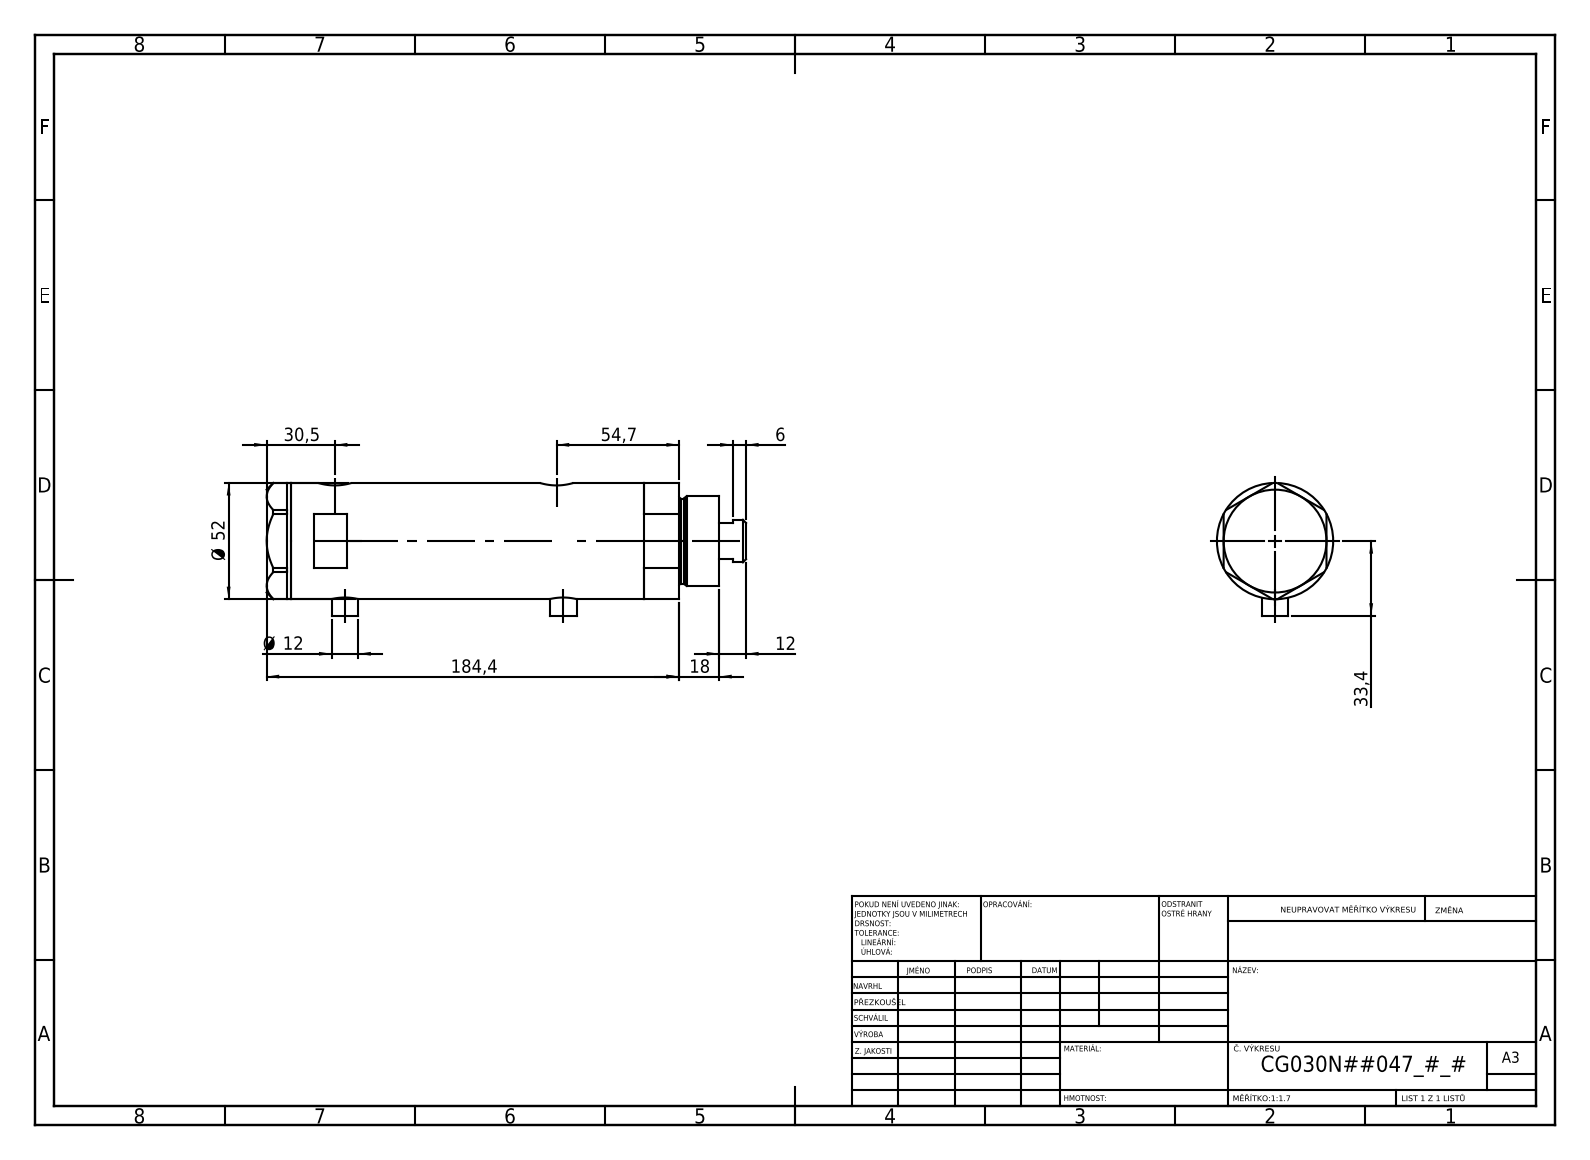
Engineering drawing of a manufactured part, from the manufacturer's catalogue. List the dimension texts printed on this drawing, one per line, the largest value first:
184,4
54,7
Ø 52
33,4
30,5
18
12
Ø 12
6
